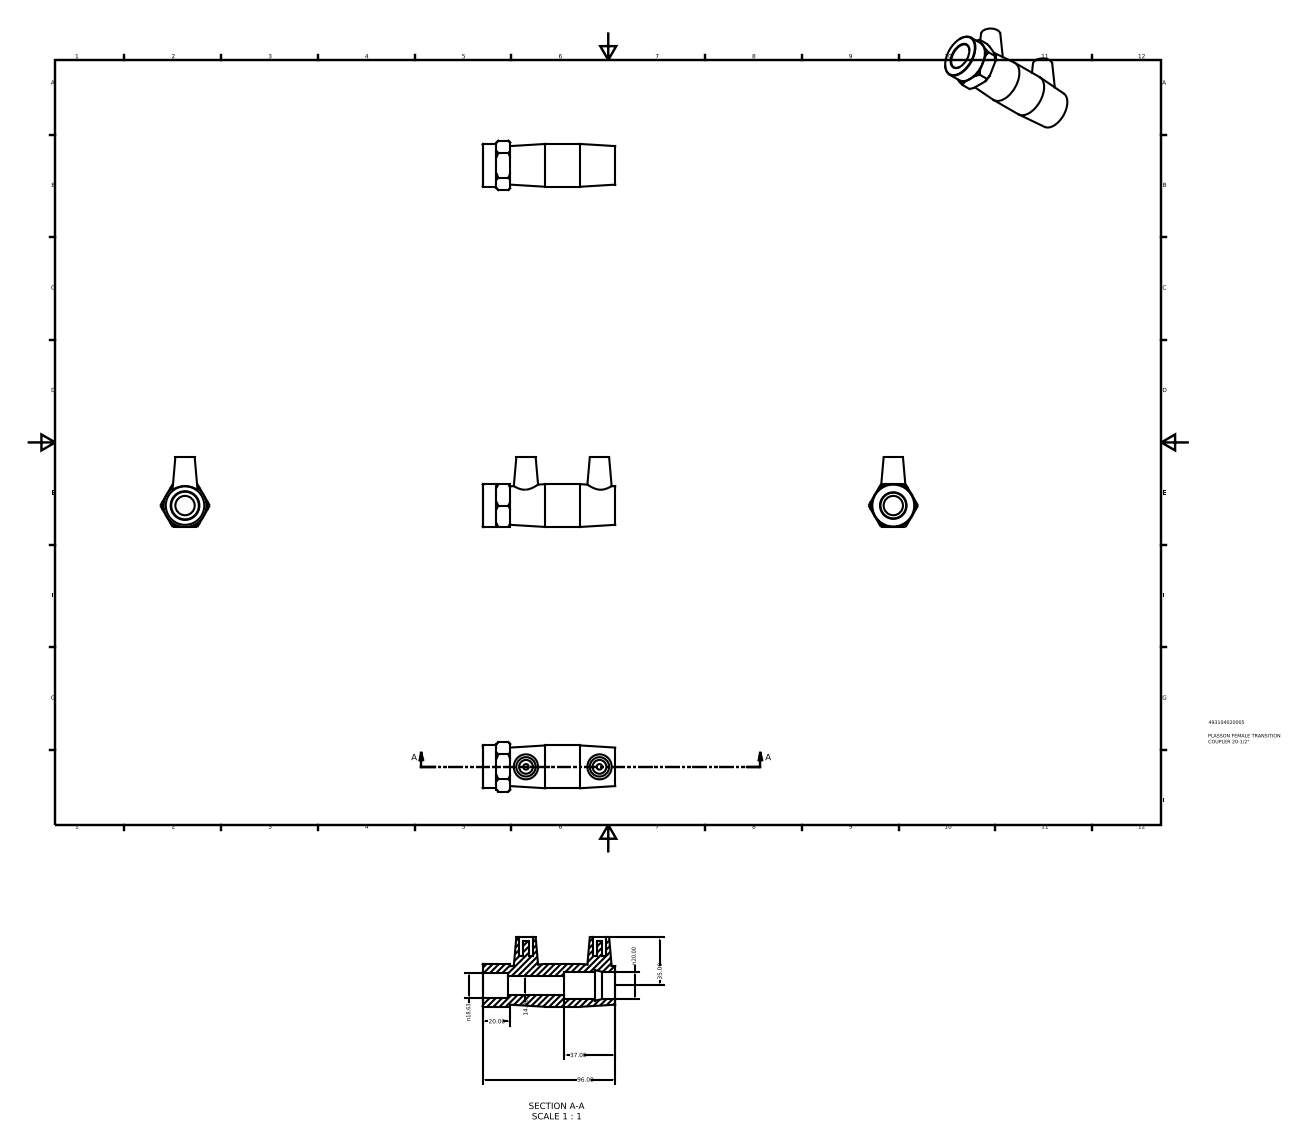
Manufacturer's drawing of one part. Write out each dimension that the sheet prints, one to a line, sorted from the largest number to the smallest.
96.00
37.00
35.00
20.00
n20.00
n18.63
14.00
